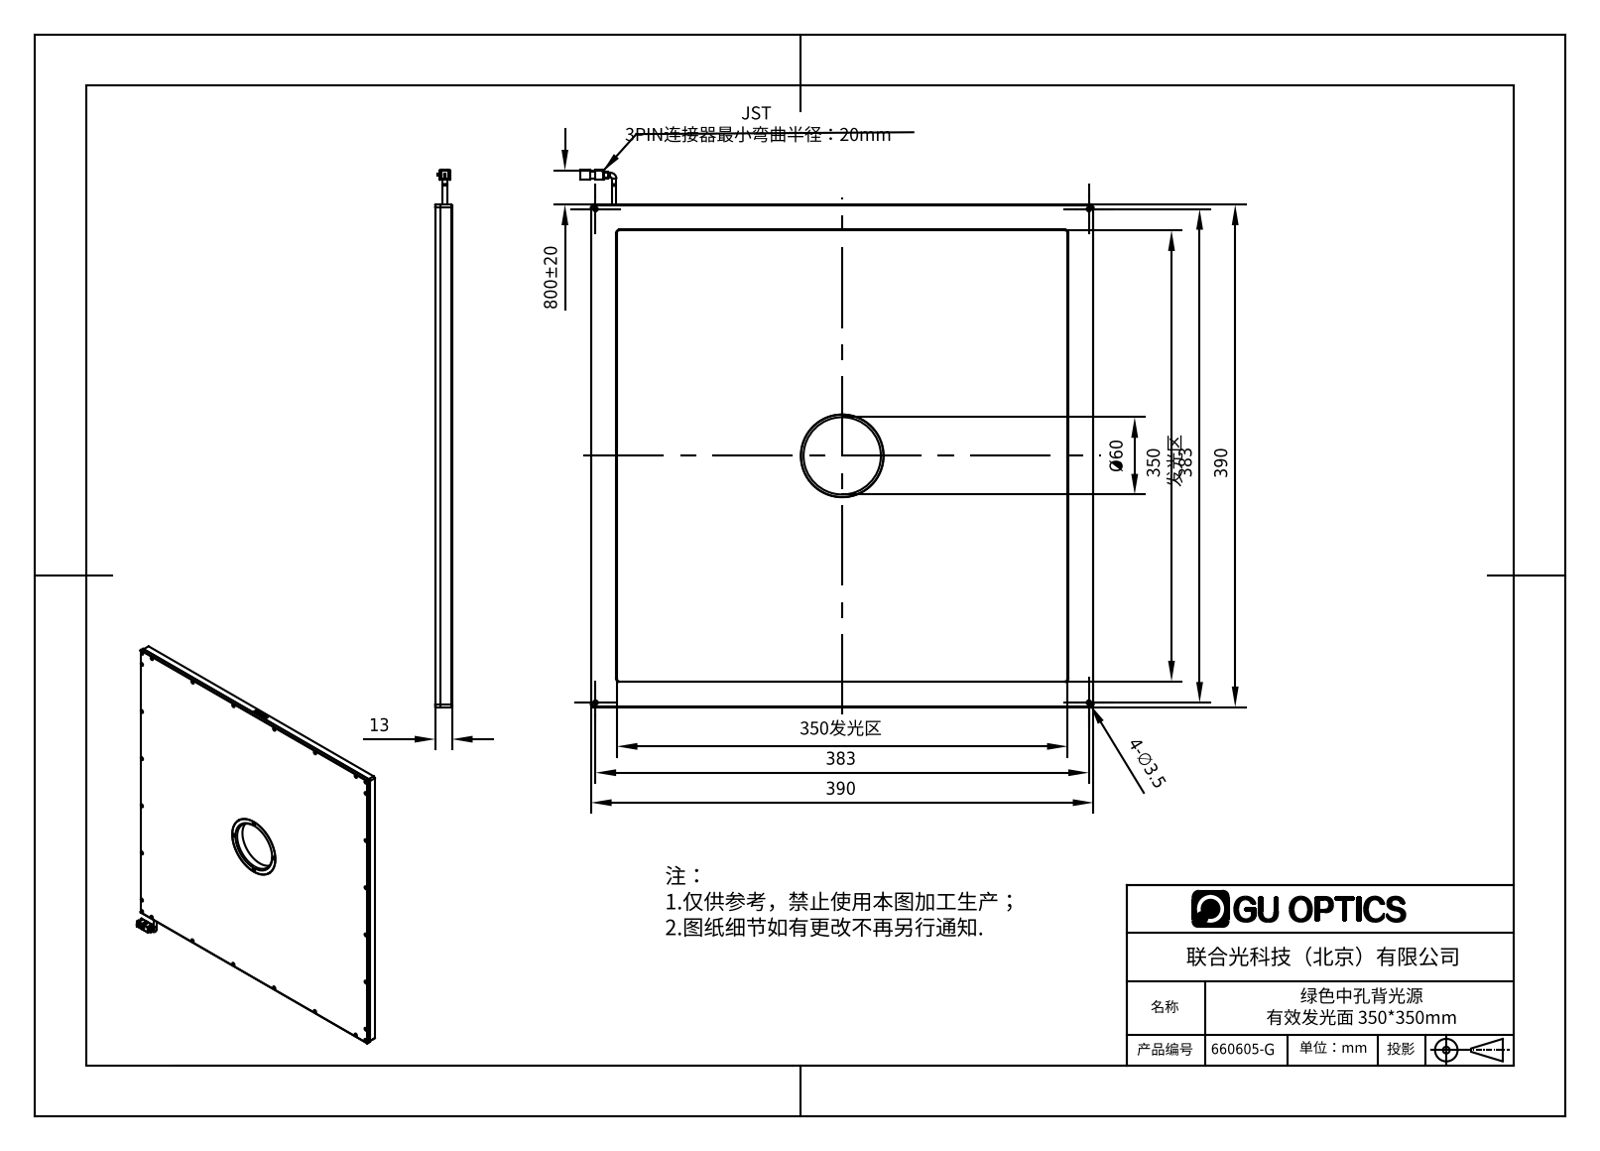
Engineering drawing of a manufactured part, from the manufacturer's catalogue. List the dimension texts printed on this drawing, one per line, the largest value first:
800±20
390
390
383
383
350 发光区
350发光区
Ø60
13
4-∅3.5
